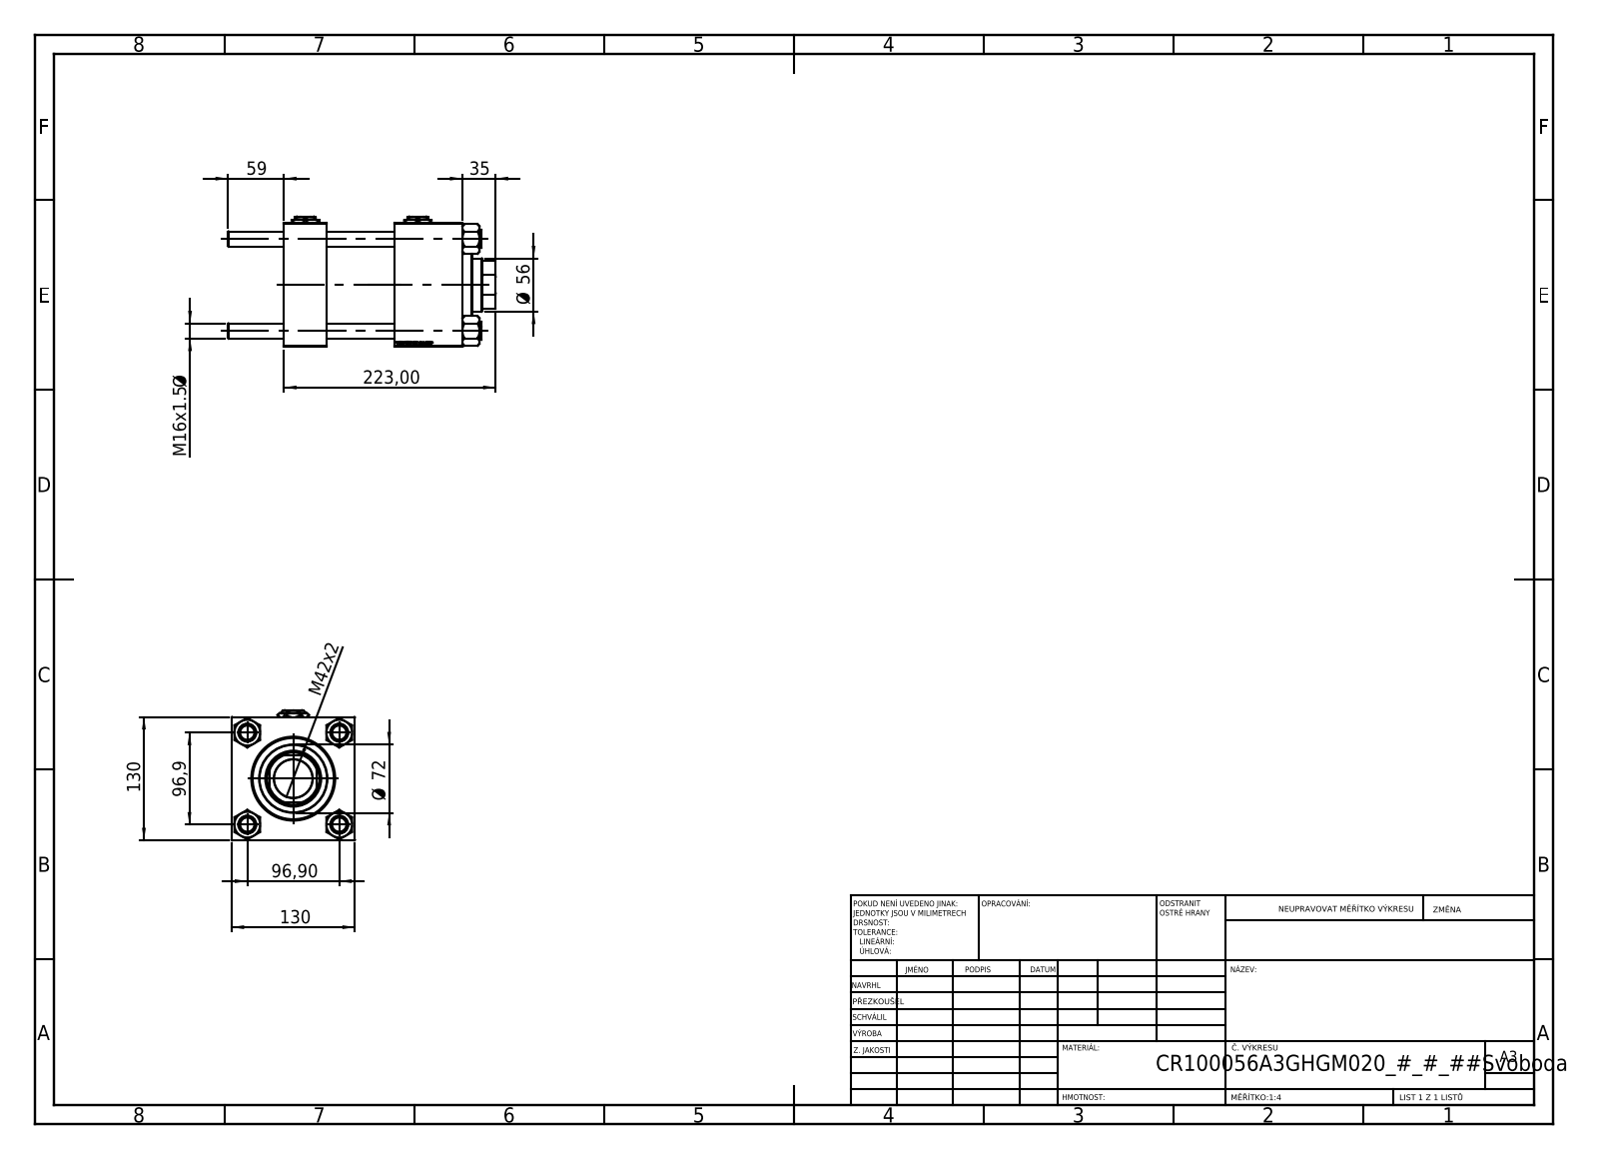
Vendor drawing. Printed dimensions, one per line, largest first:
223,00
130
130
96,9
96,90
Ø 72
59
Ø 56
M42x2
35
M16x1.5 Ø
